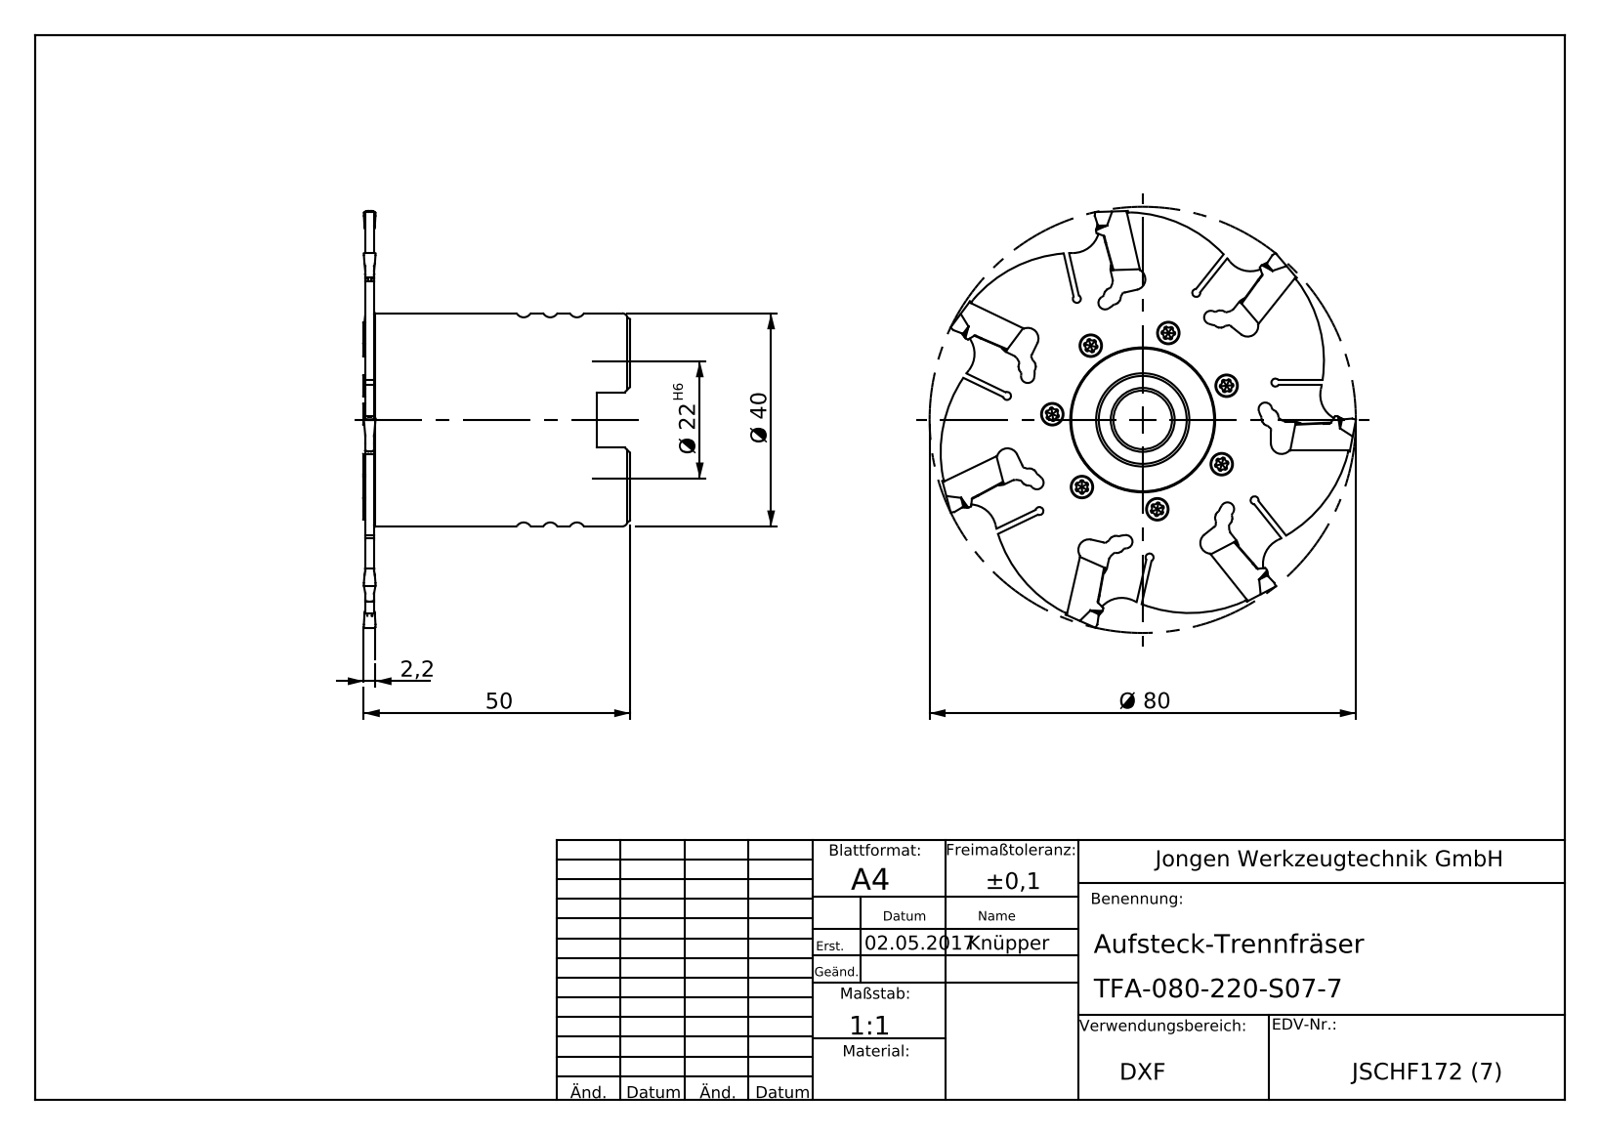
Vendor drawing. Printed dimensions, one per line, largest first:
Ø 80
50
Ø 40
Ø 22 H6
2,2
